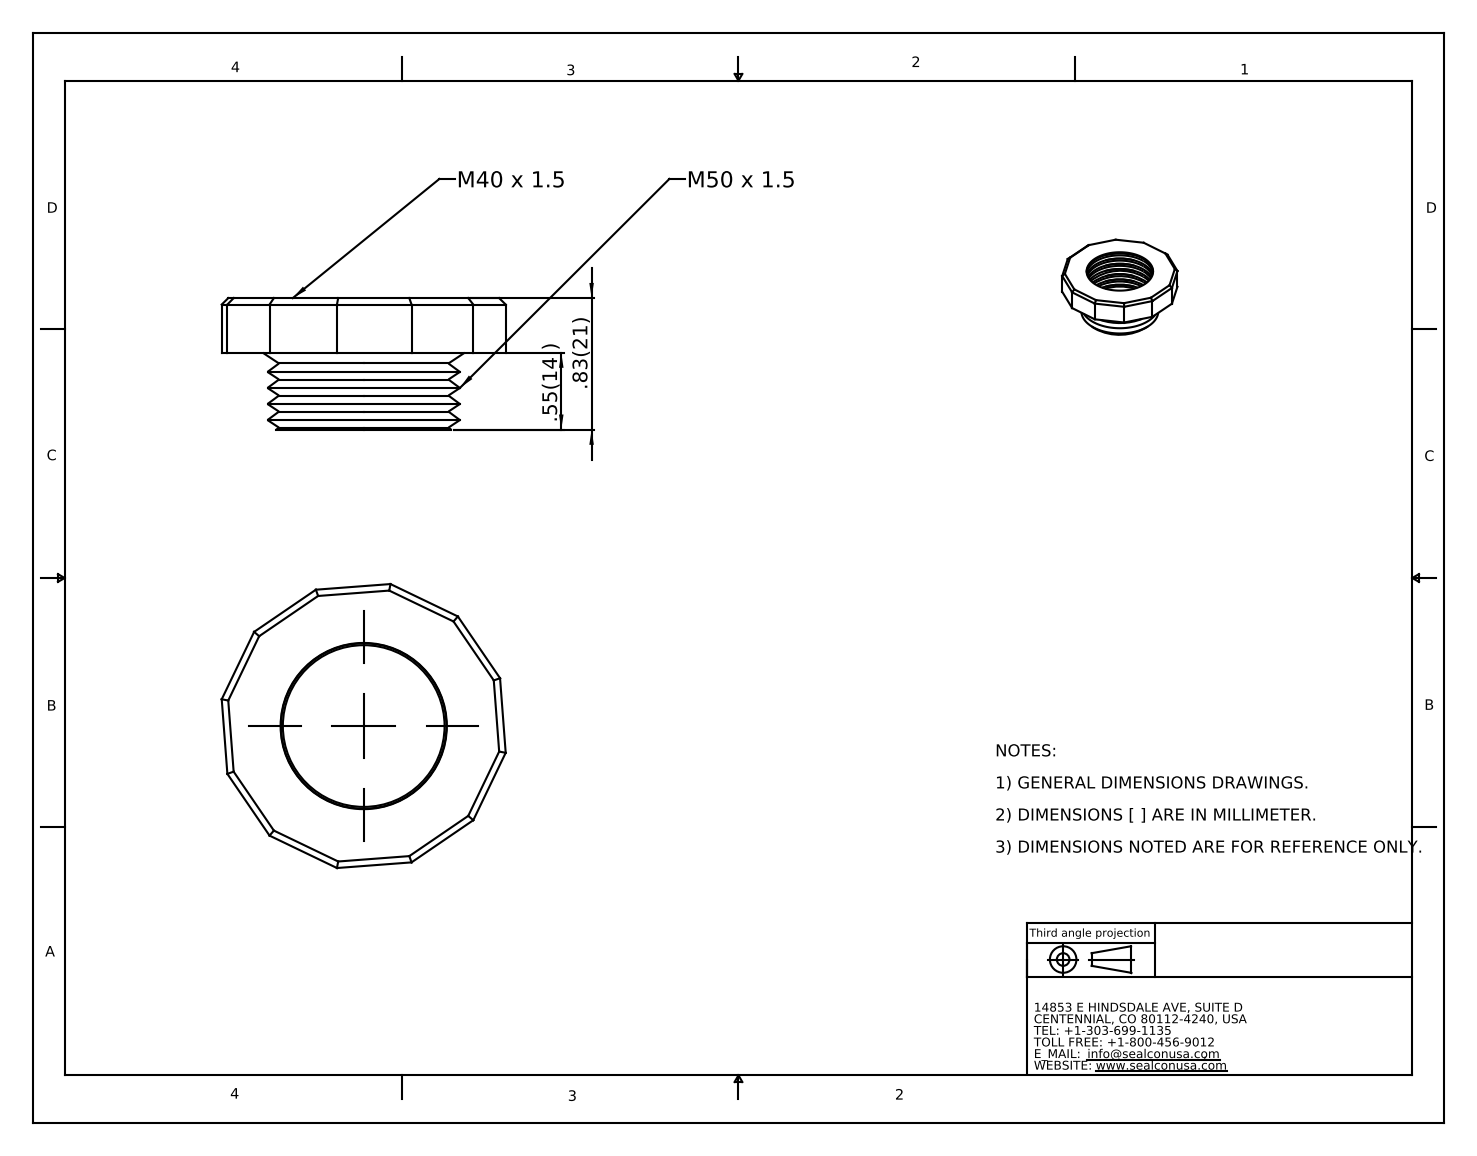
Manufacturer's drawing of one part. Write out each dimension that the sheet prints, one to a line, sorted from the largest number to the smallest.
.83(21)
.55(14 )
